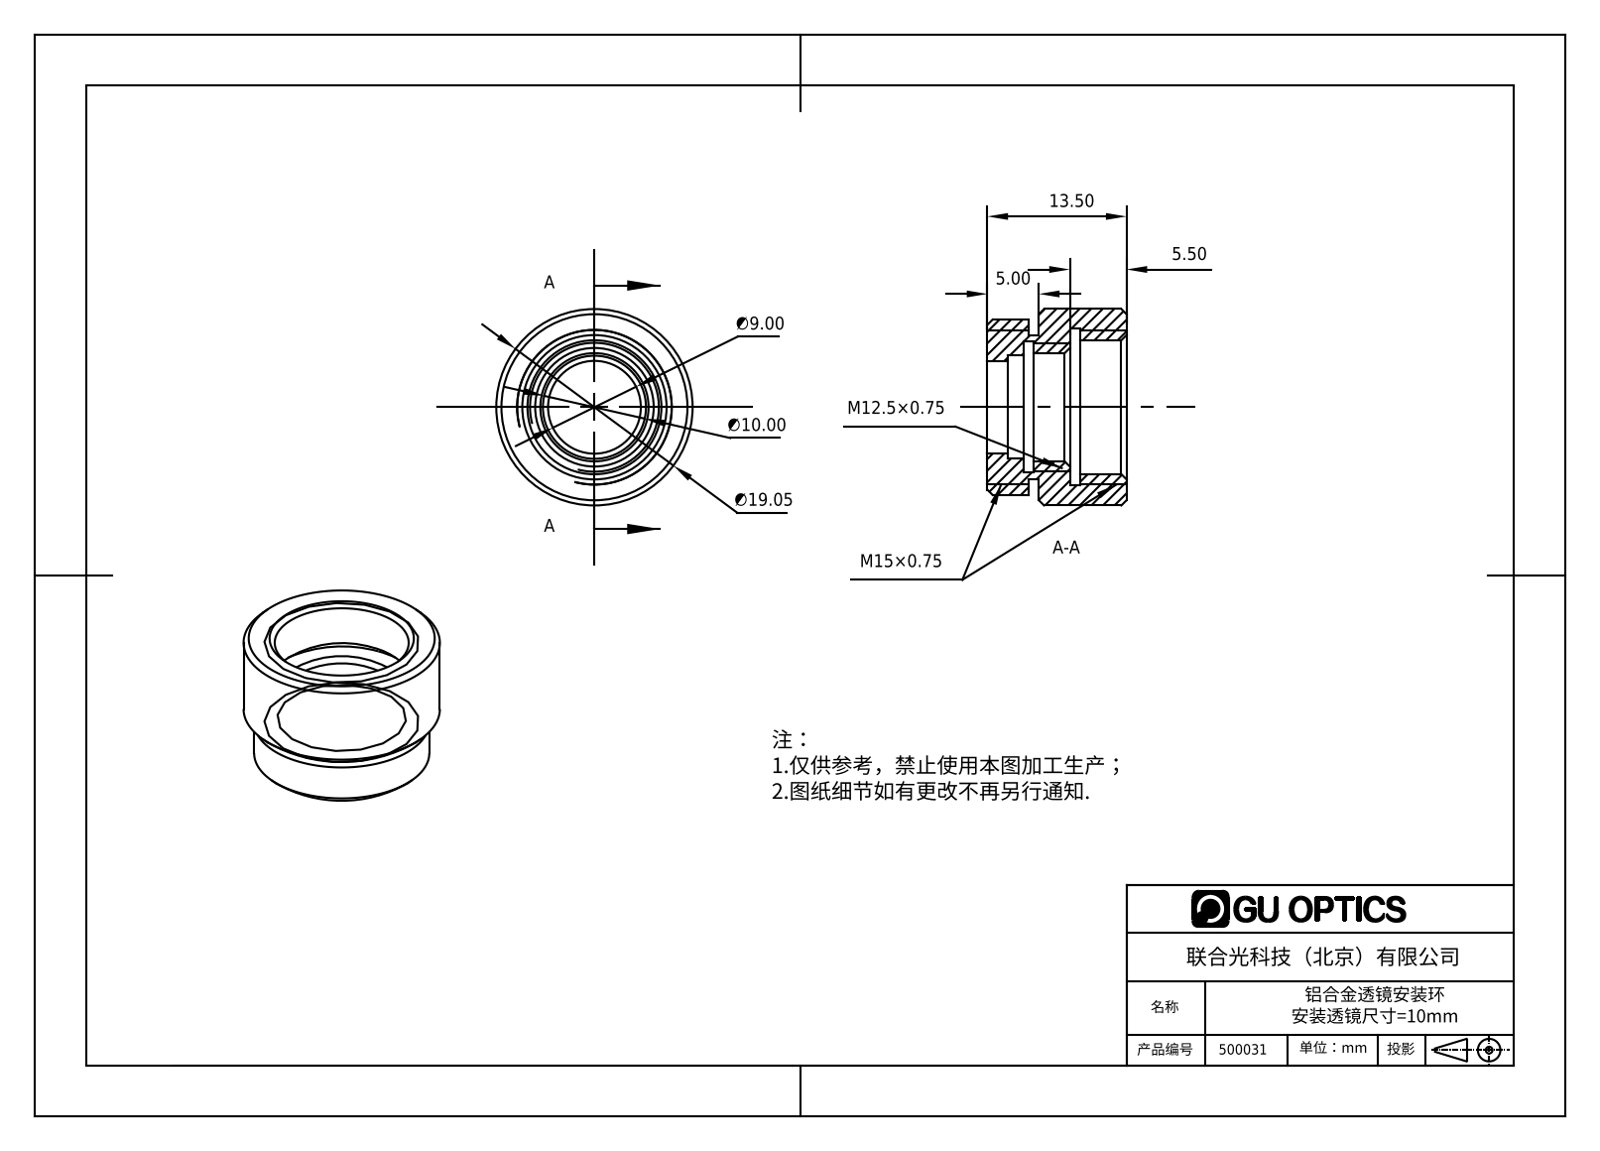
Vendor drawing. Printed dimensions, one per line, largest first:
∅19.05
13.50
∅10.00
∅9.00
5.50
5.00
